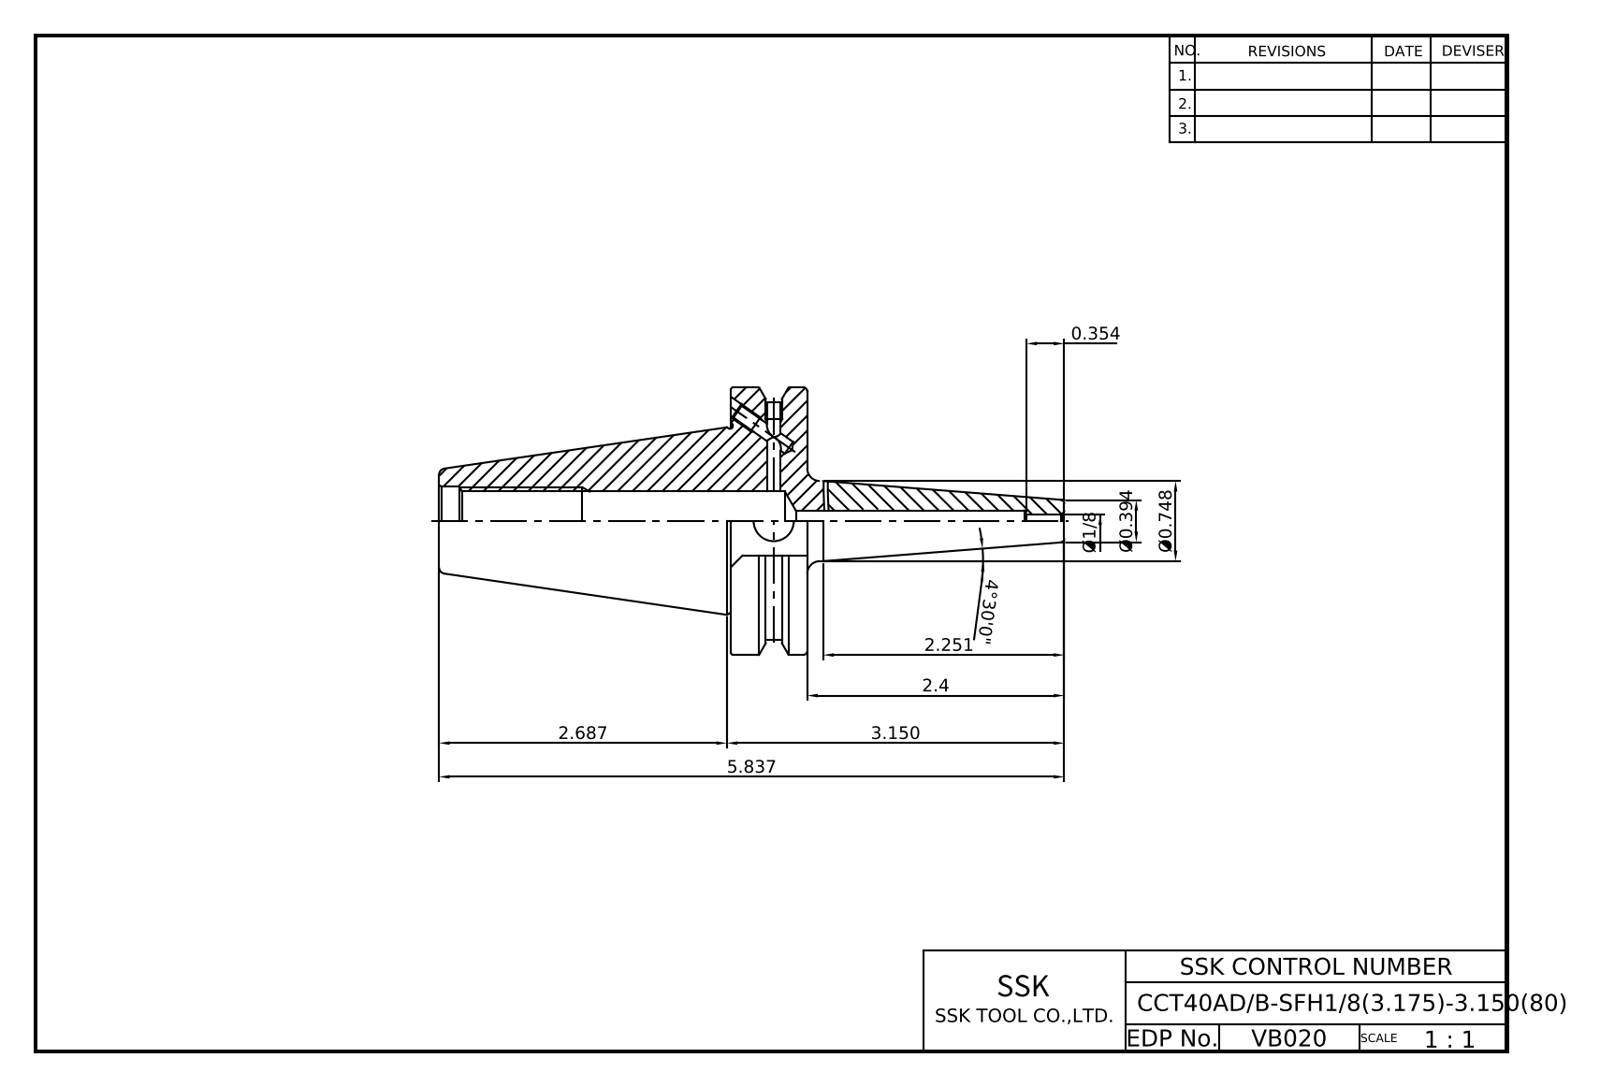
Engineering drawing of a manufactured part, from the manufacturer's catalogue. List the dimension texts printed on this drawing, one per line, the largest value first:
5.837
4°30'0"
3.150
2.687
2.4
2.251
Ø0.748
Ø0.394
0.354
